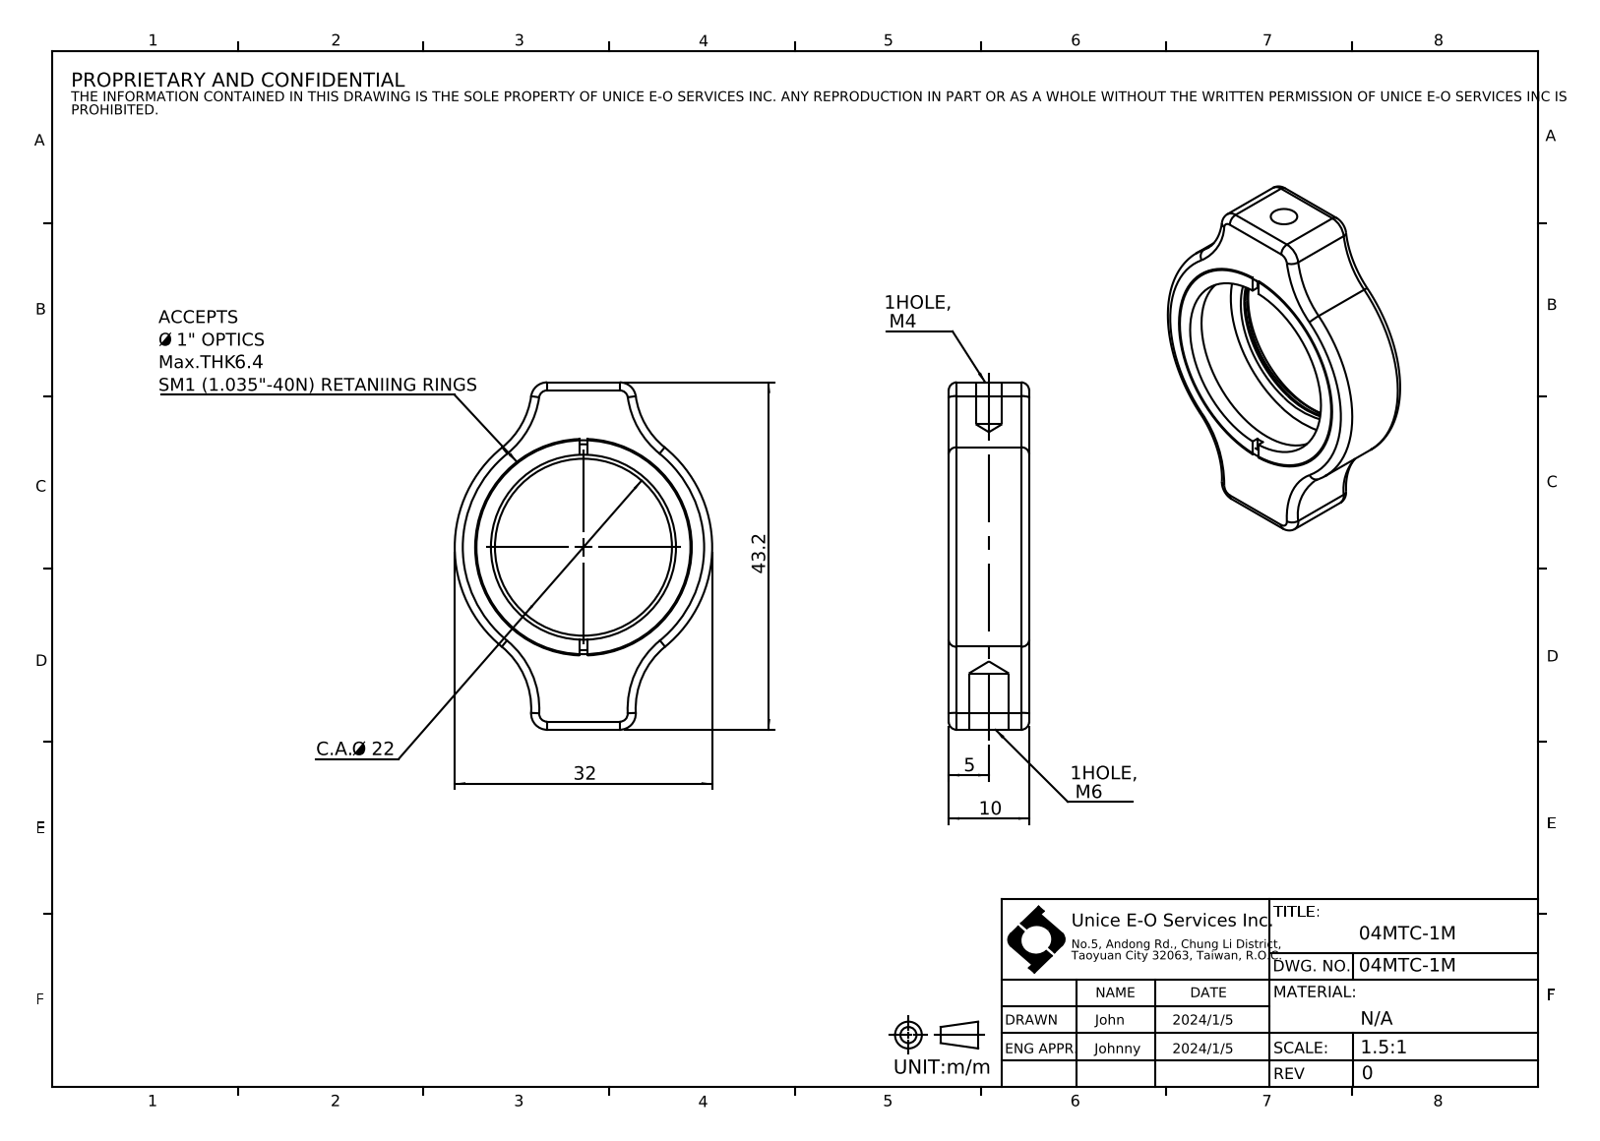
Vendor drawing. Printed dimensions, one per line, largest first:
43.2
32
C.A. Ø 22
10
5
